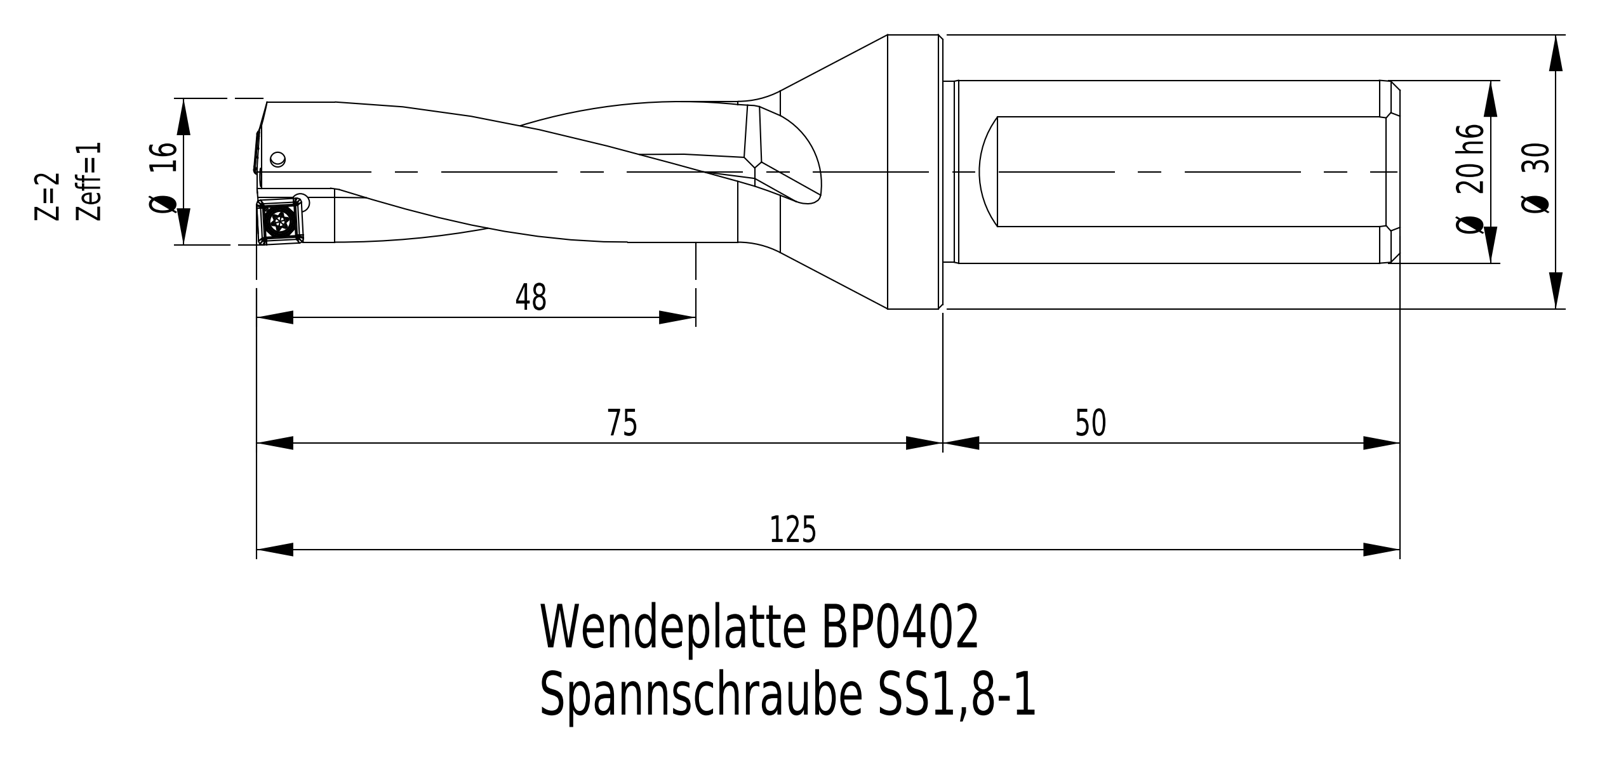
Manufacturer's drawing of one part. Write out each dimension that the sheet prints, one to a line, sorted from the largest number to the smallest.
125
75
50
48
Ø 30
Ø 20 h6
Ø 16
